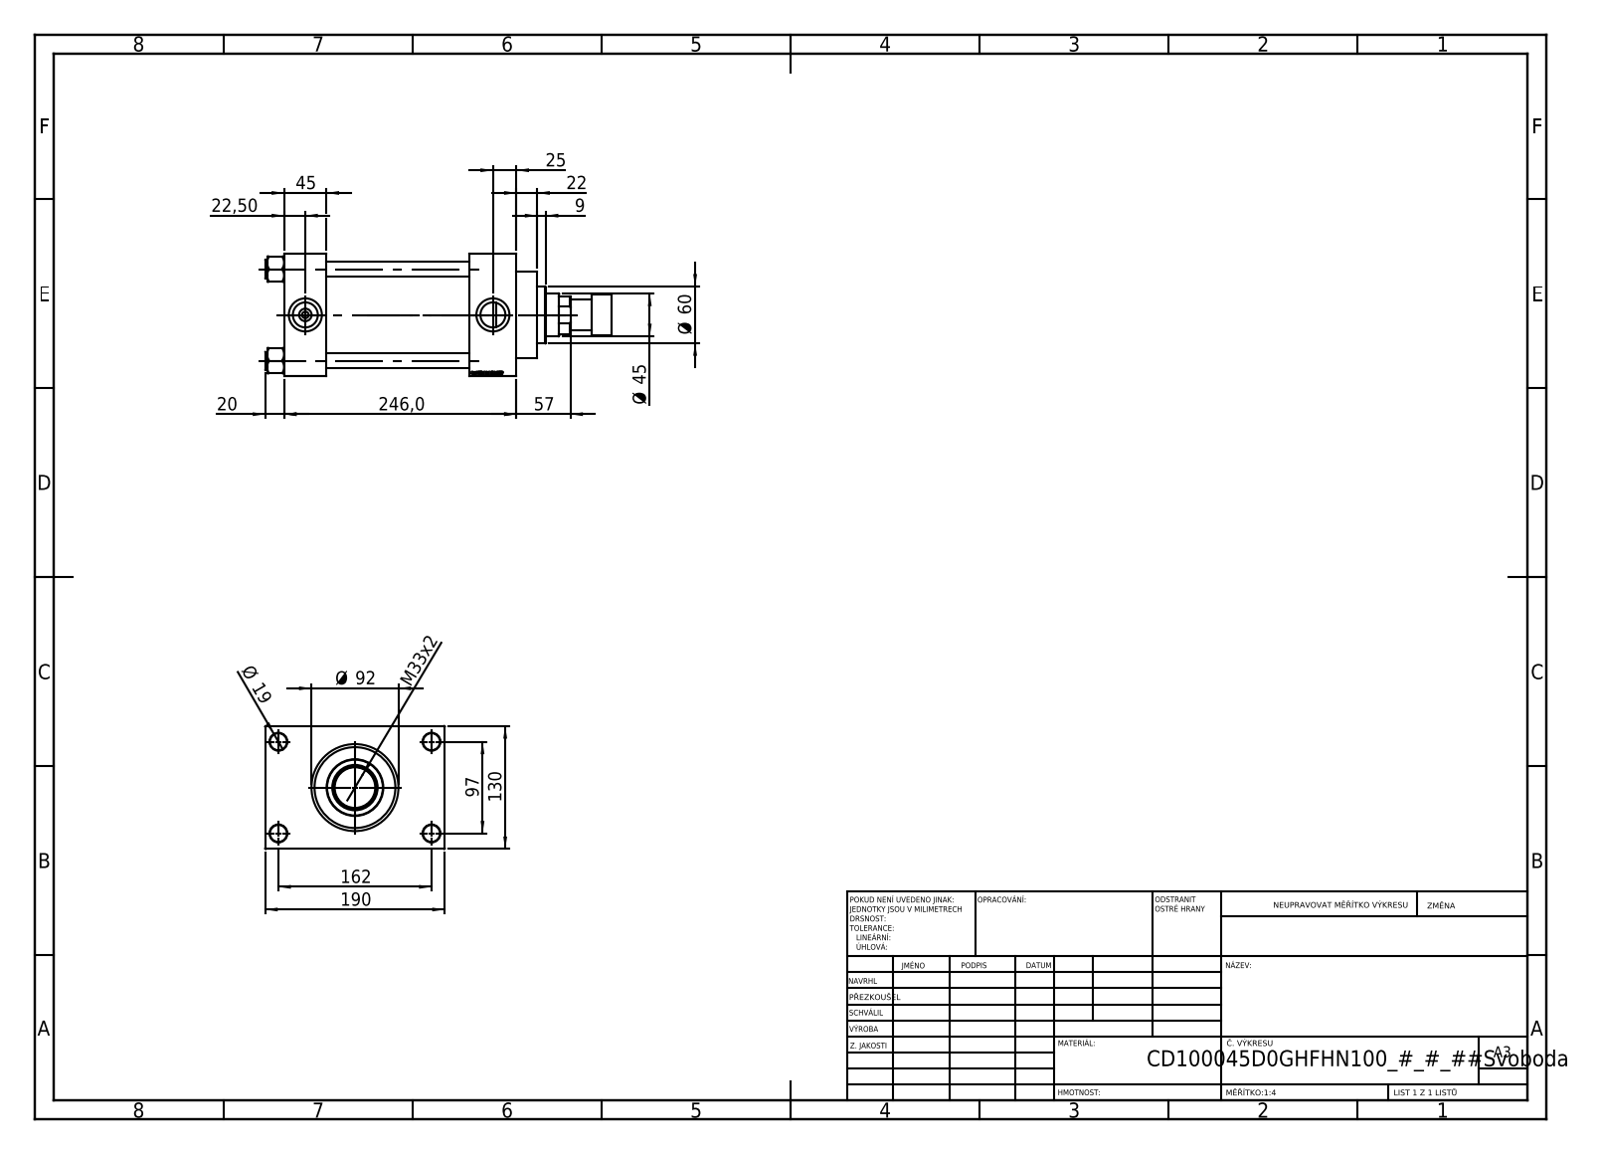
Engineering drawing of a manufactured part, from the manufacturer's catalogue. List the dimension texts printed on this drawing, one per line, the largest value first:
246,0
190
162
130
97
Ø 92
Ø 60
57
Ø 45
45
M33x2
25
22,50
22
20
Ø 19
9
